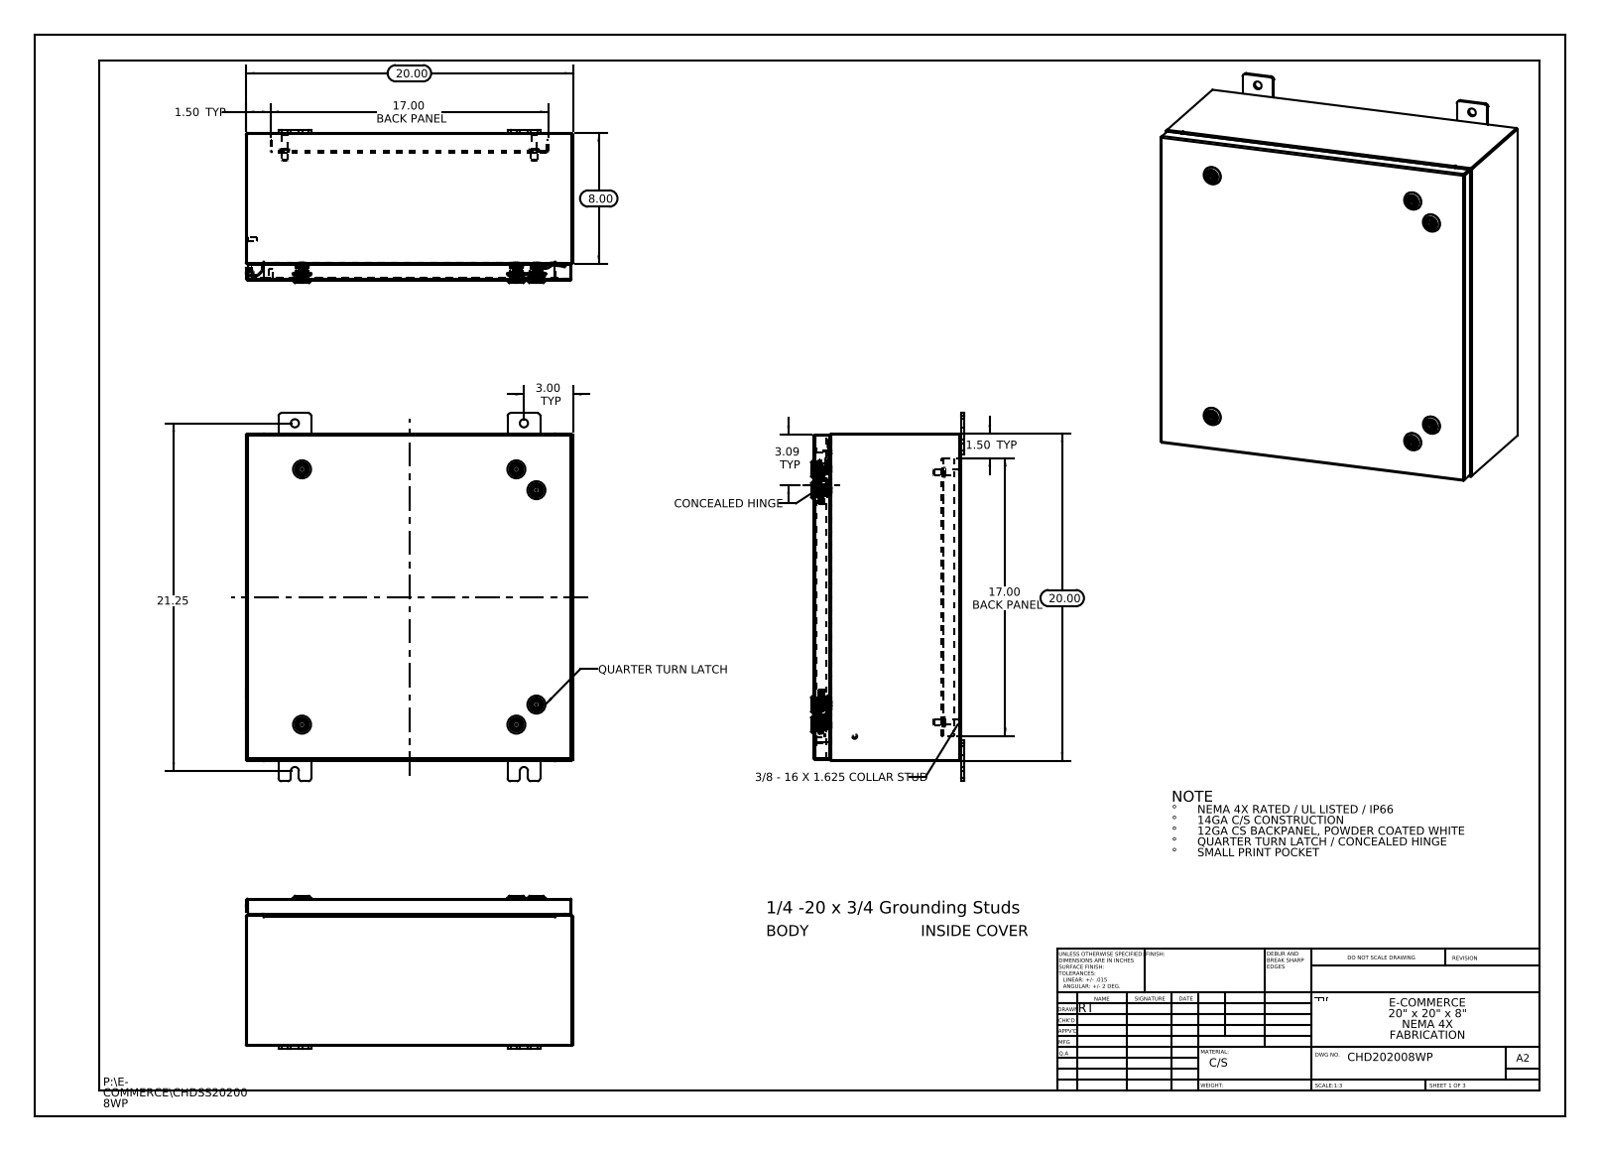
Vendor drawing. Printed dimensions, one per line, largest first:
21.25
20.00
20.00
17.00 BACK PANEL
17.00 BACK PANEL
8.00
3.09 TYP
3.00 TYP
1.50 TYP
1.50 TYP
